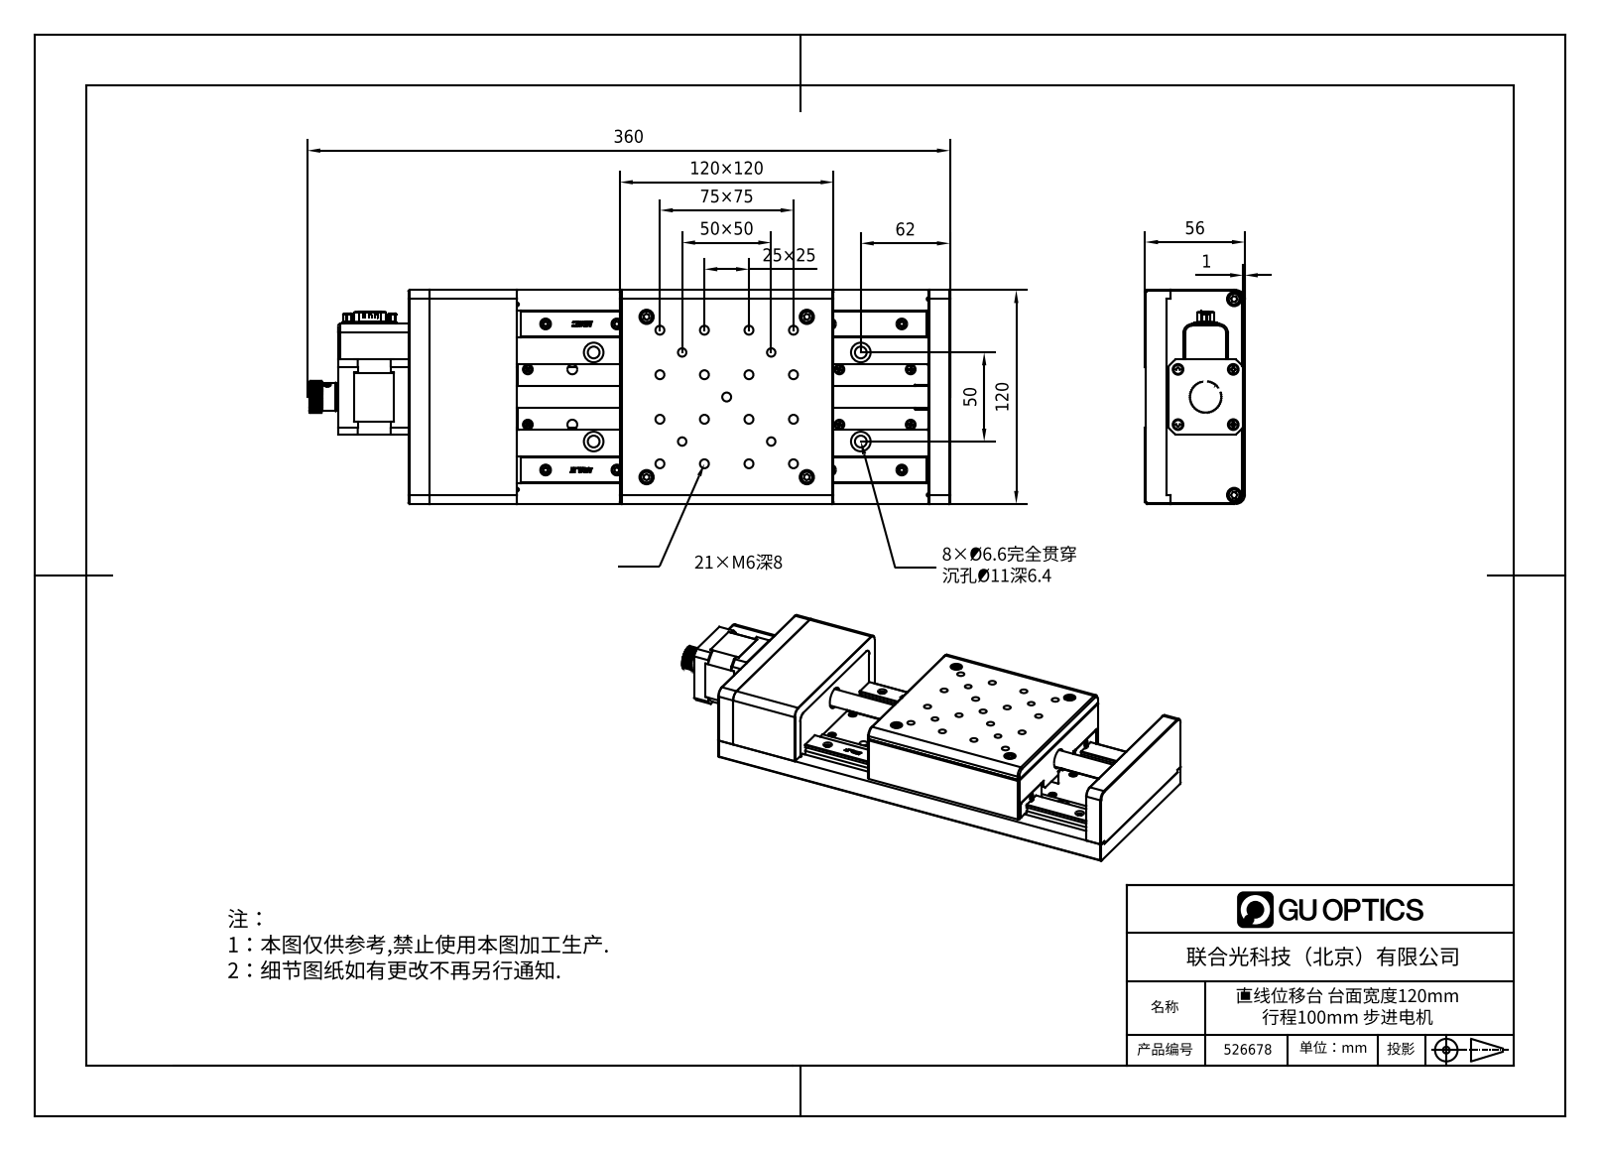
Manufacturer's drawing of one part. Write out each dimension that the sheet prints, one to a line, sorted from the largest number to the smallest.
360
120×120
120
75×75
62
56
50×50
50
25×25
1
